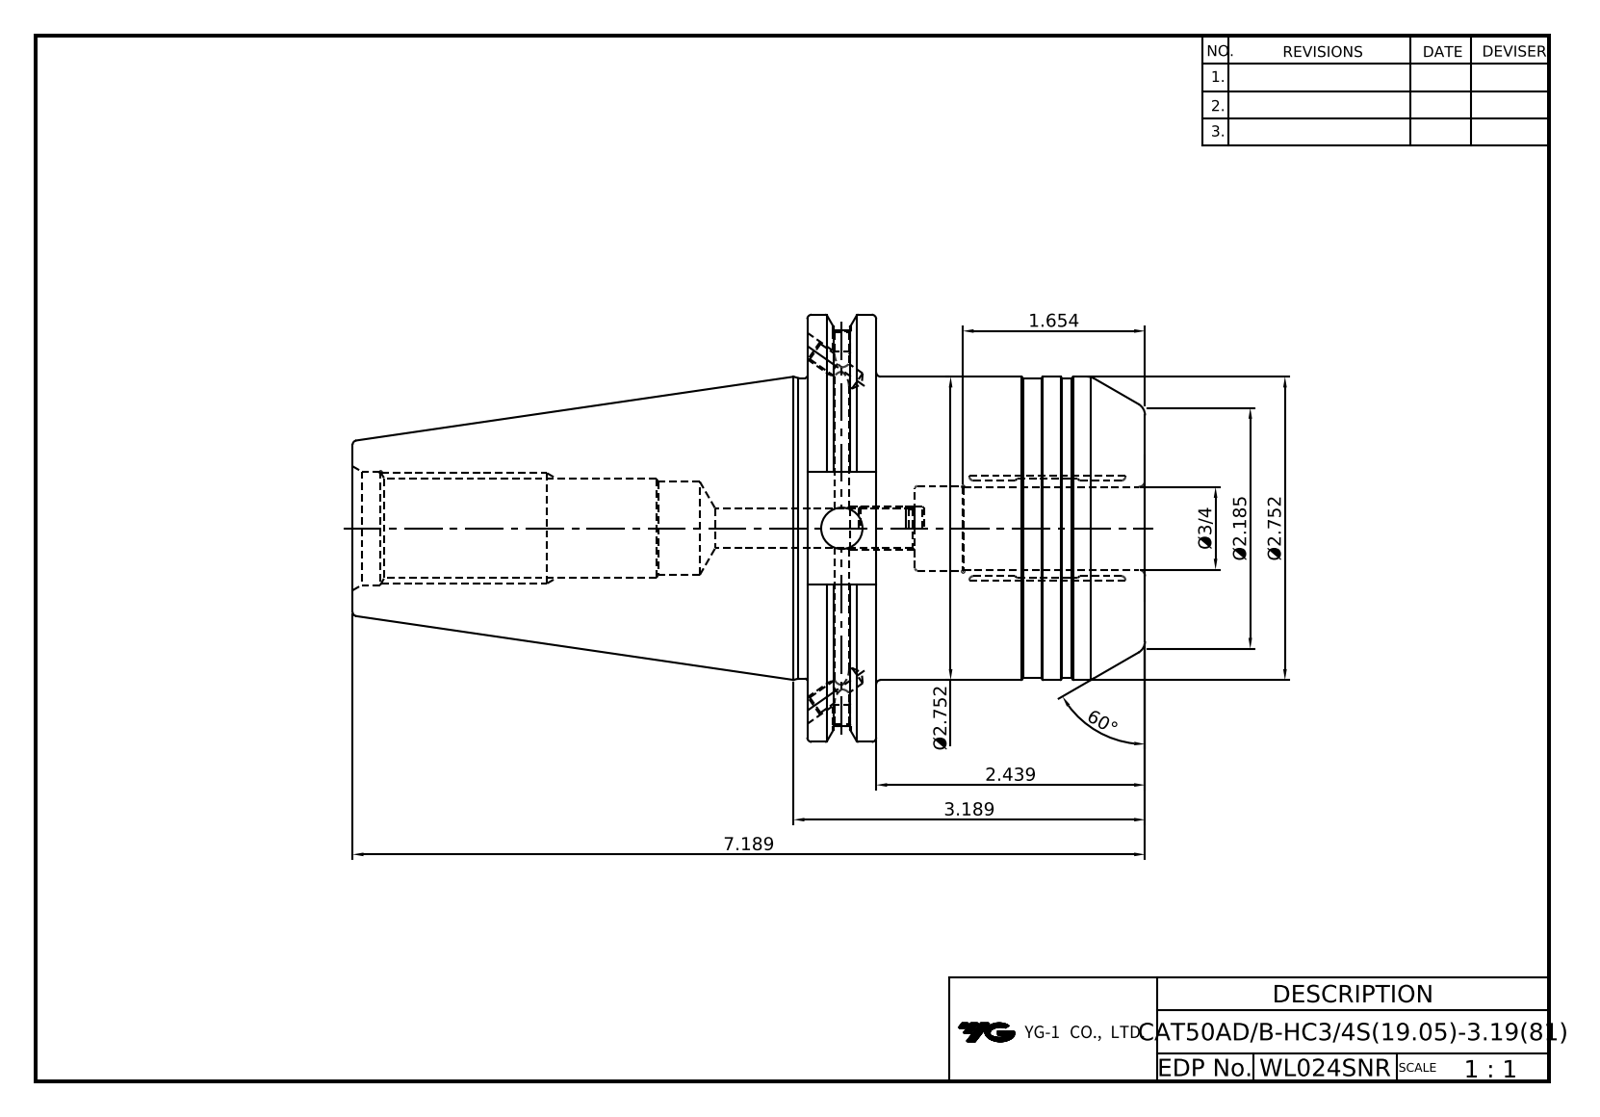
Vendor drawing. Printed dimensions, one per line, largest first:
60°
7.189
3.189
Ø2.752
Ø2.752
2.439
Ø2.185
1.654
Ø3/4
